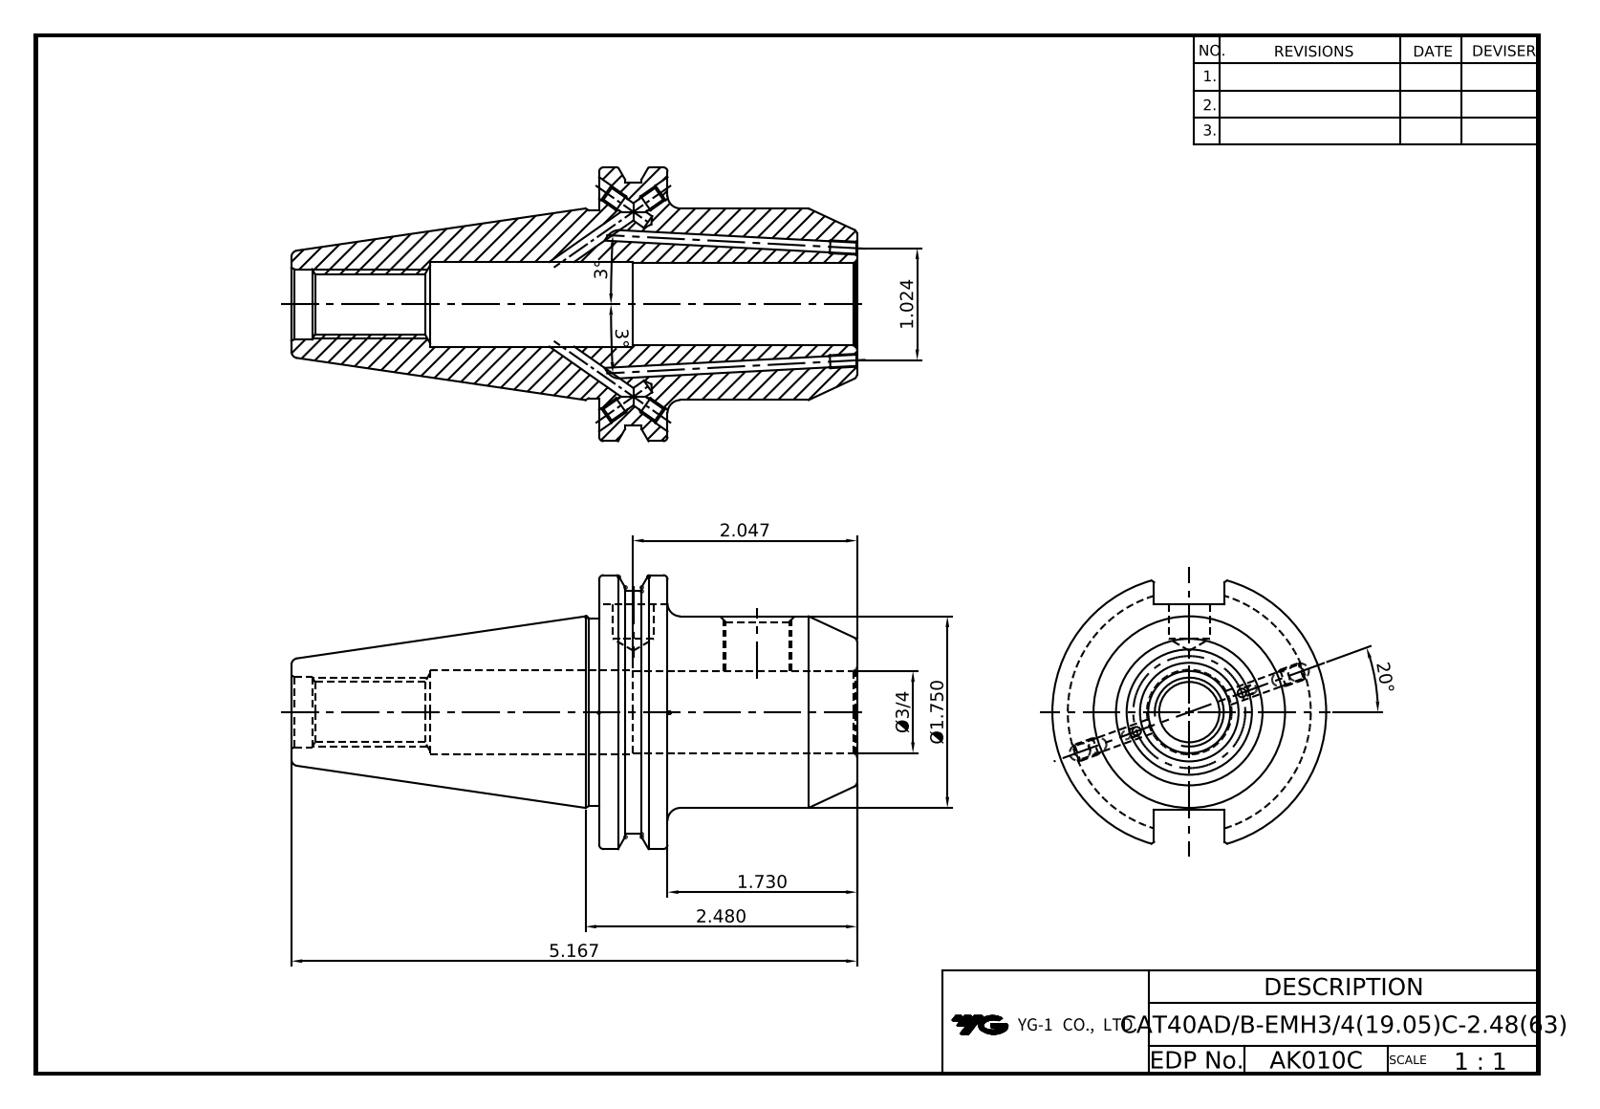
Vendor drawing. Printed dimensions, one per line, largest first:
20°
5.167
3°
3°
2.480
2.047
Ø1.750
1.730
1.024
Ø3/4
